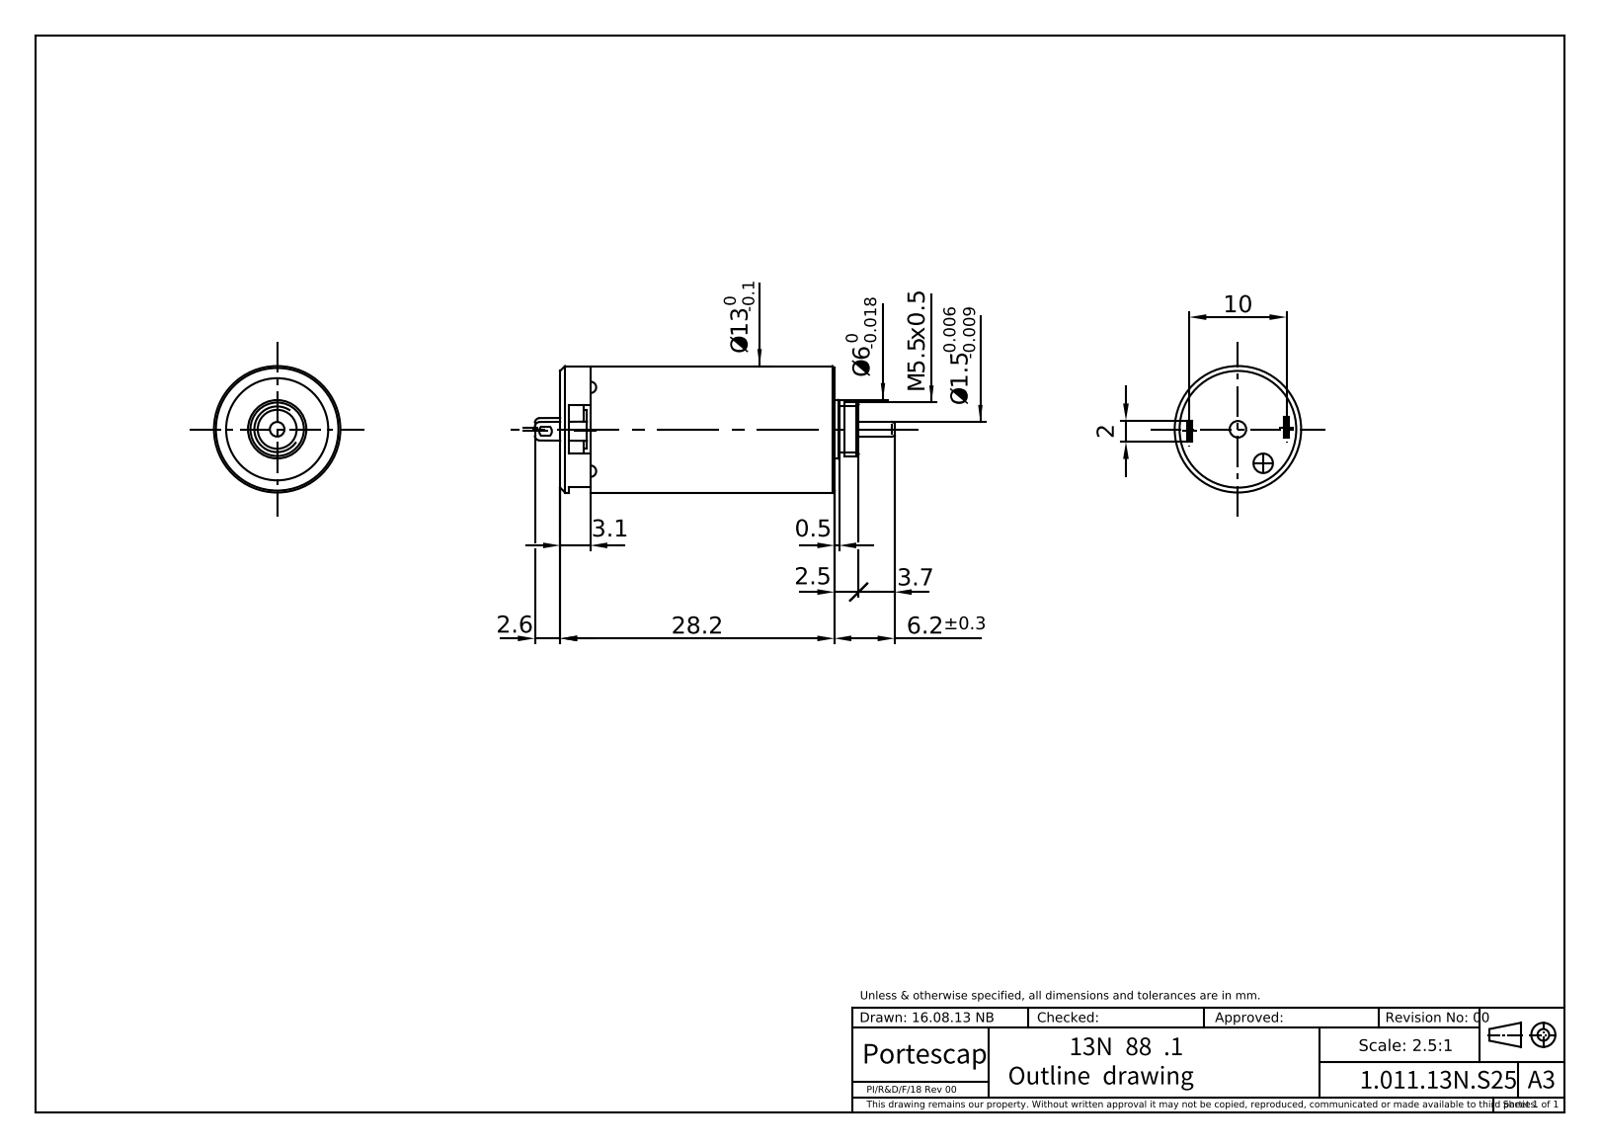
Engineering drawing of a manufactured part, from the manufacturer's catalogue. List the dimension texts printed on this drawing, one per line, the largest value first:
28.2
10
6.2±0.3
3.7
3.1
2.6
2.5
2
0.5
